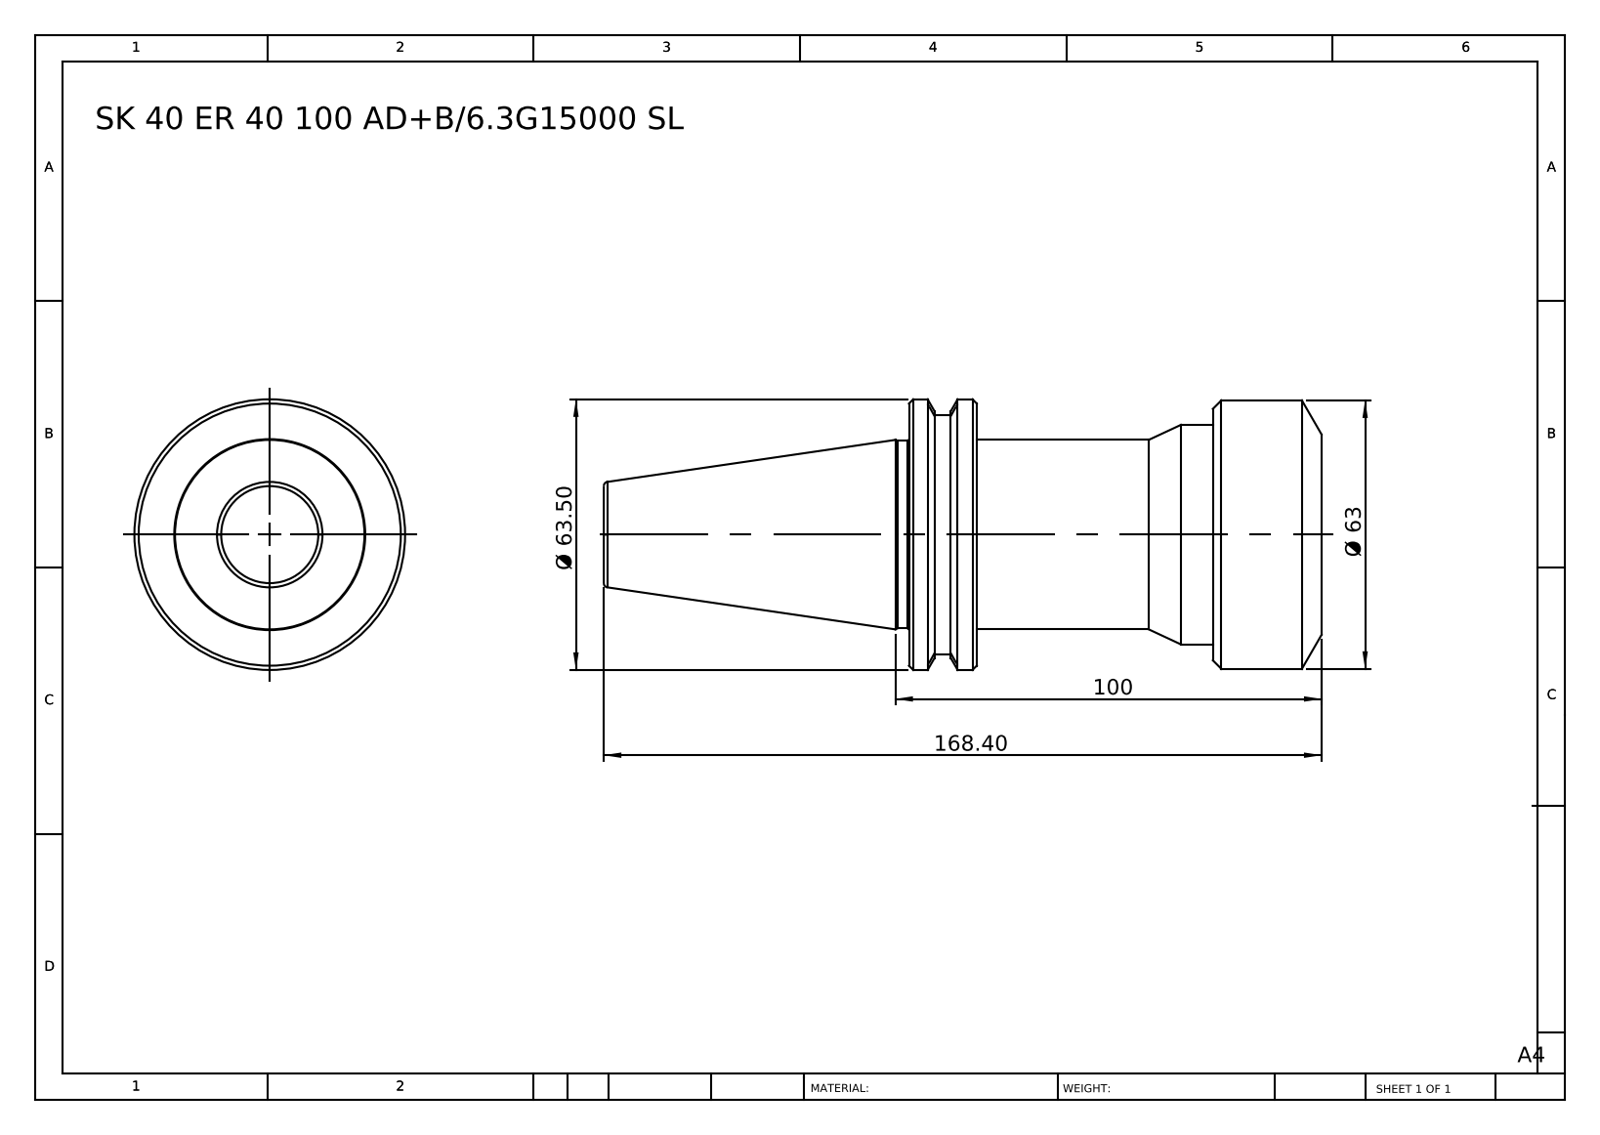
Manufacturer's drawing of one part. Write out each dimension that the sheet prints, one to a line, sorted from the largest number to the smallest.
168.40
100
Ø 63.50
Ø 63
